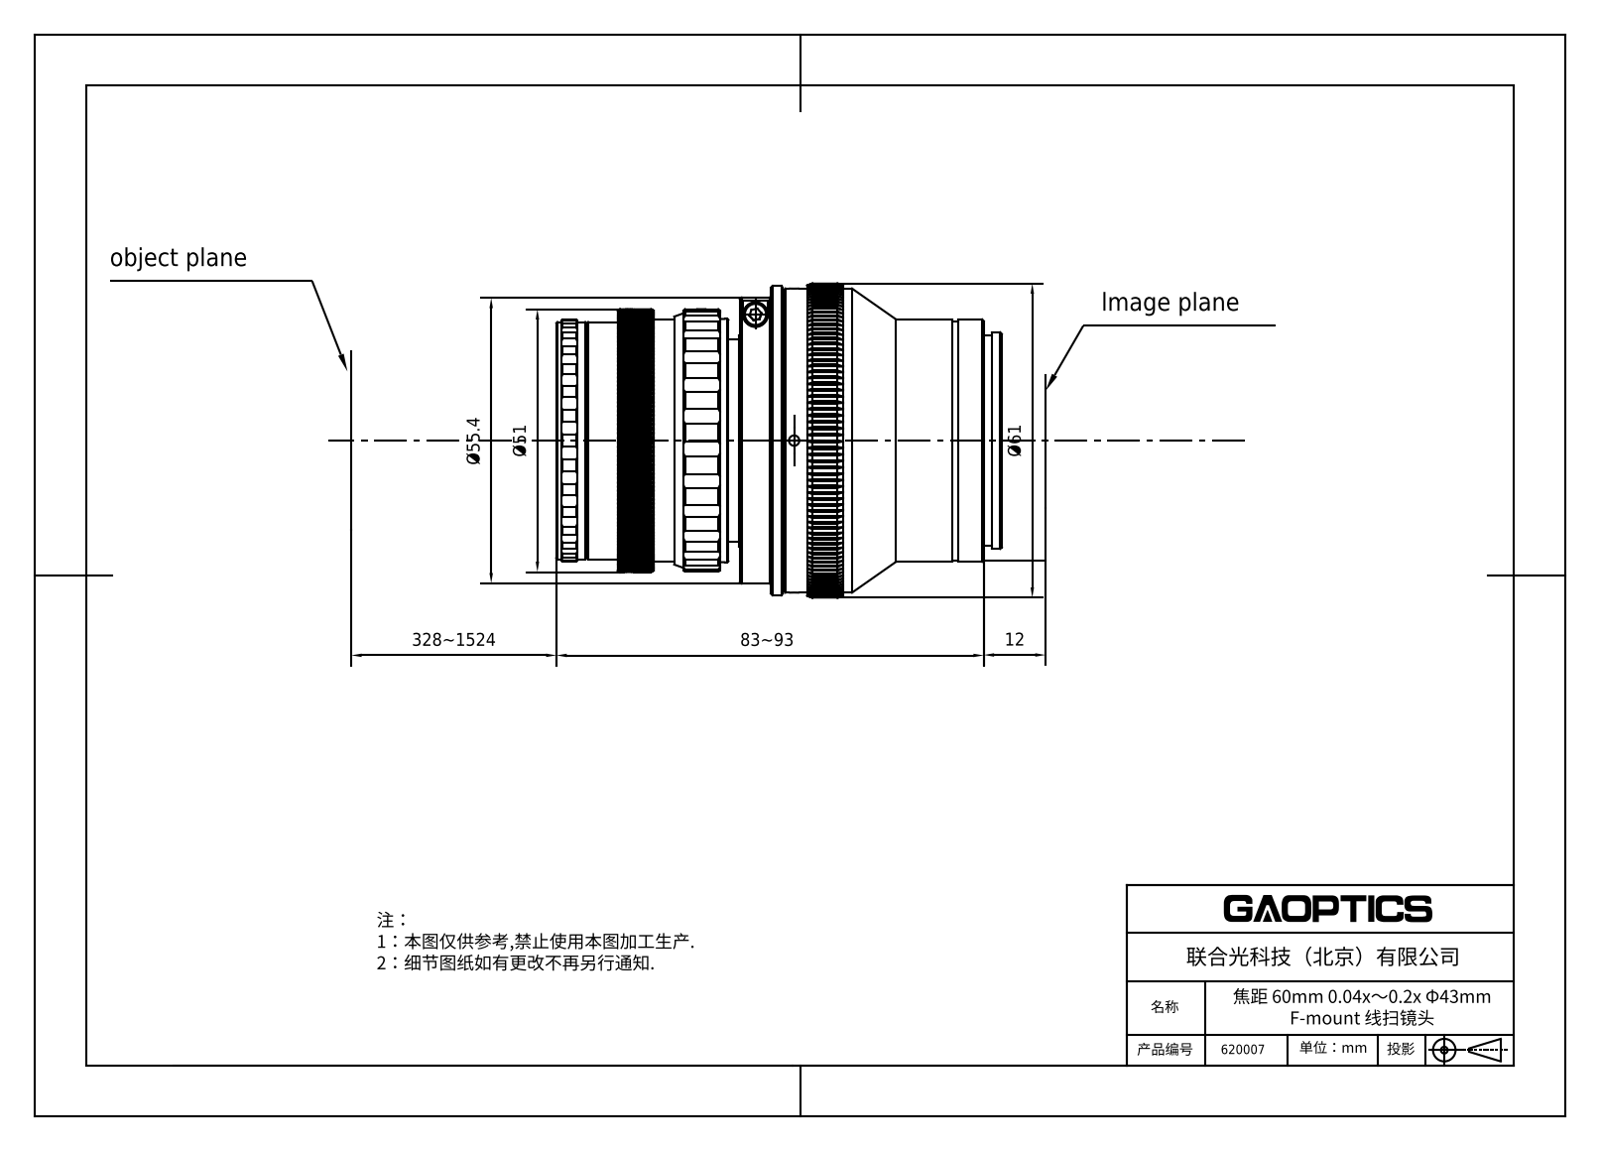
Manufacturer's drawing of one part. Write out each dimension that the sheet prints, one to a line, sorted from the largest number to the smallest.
328~1524
83~93
Ø61
Ø55.4
Ø51
12
